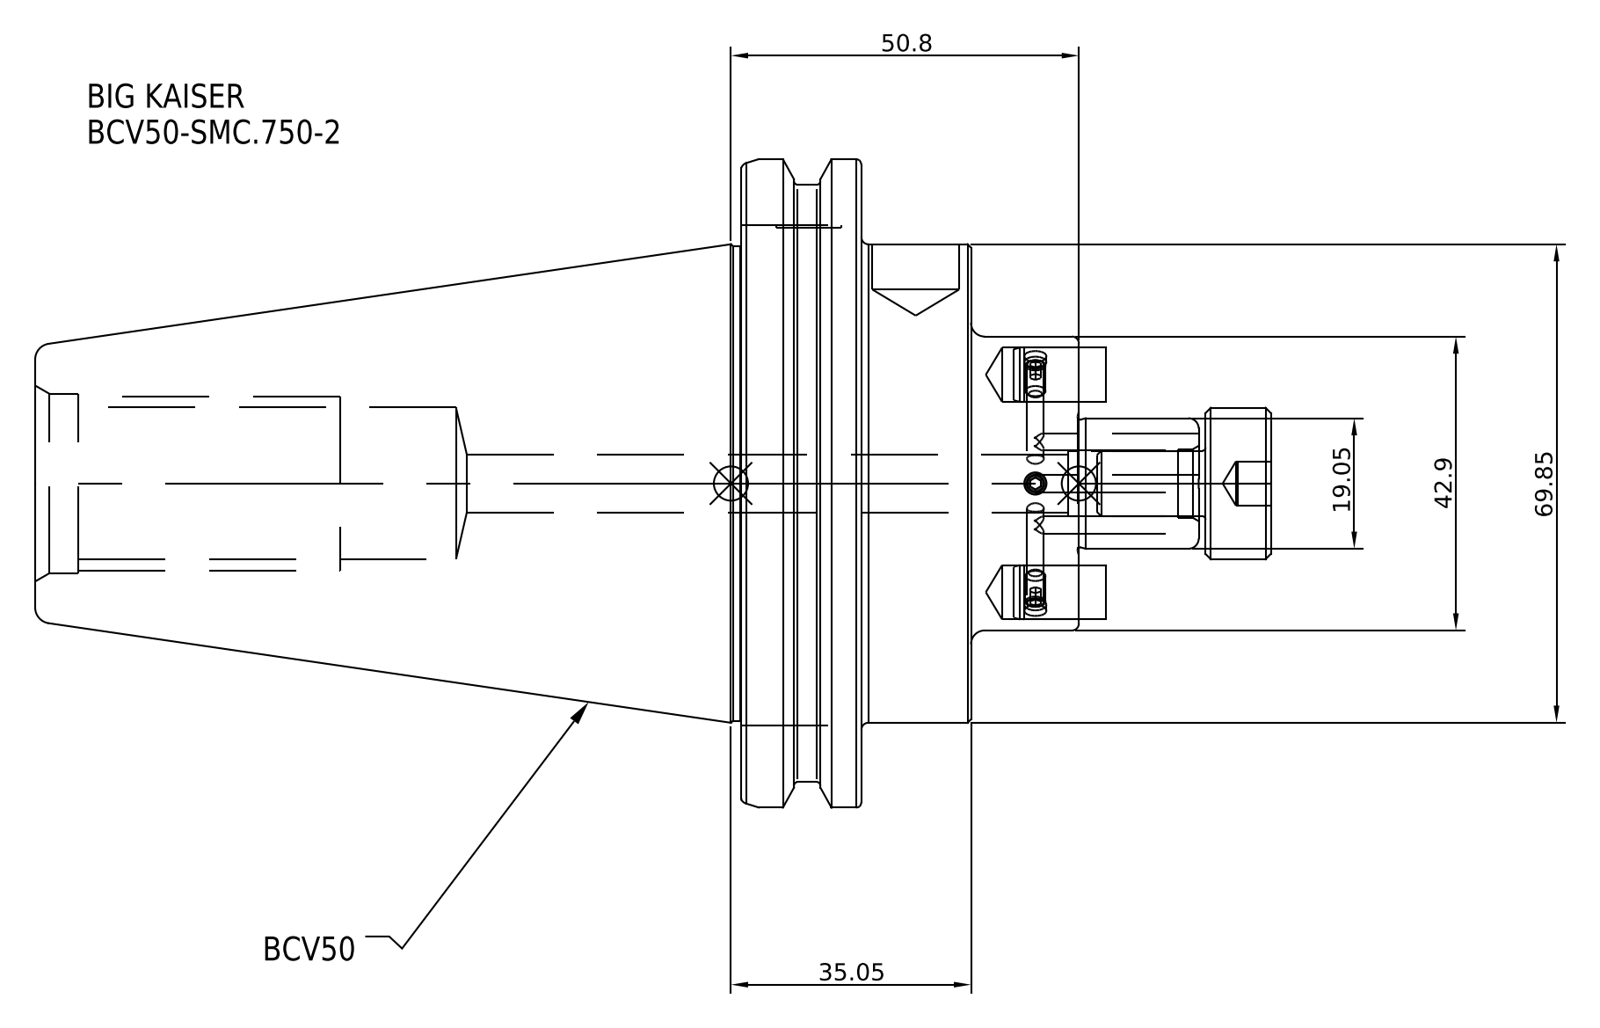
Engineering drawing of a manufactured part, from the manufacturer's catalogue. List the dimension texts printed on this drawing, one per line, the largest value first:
69.85
50.8
42.9
35.05
19.05
